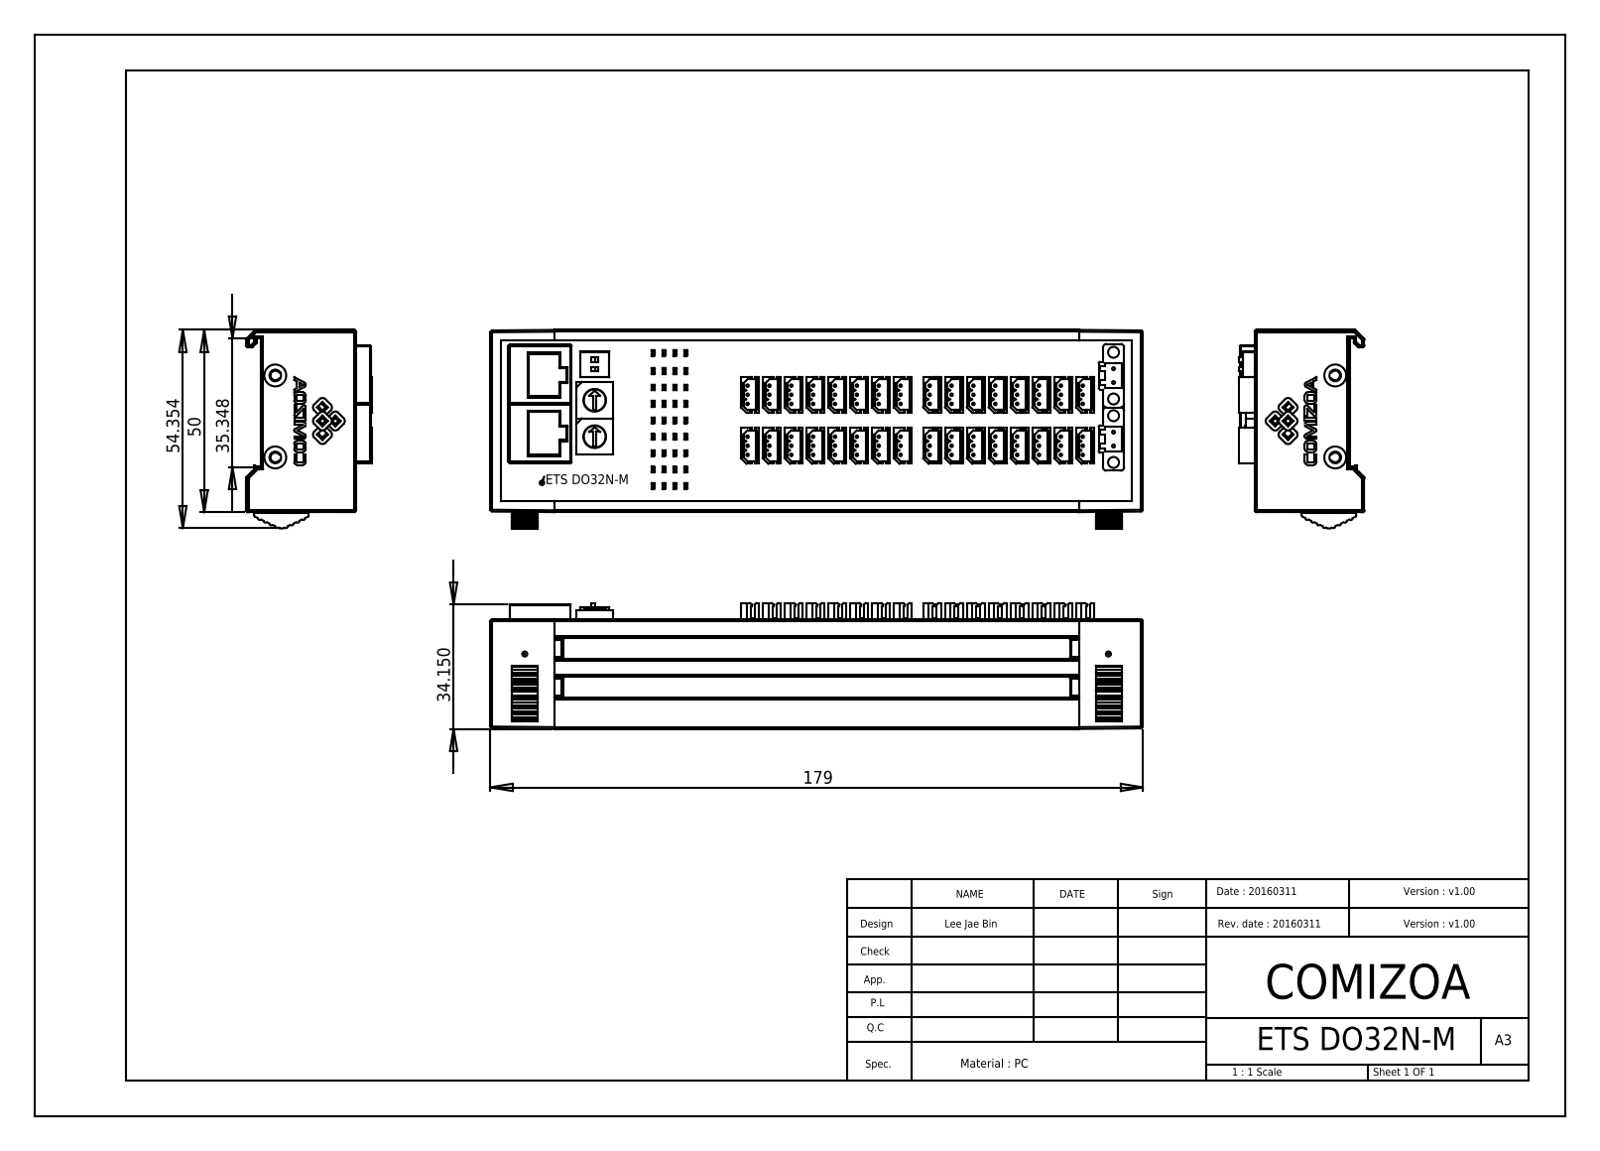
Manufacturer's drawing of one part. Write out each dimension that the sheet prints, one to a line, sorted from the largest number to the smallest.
179
54.354
50
35.348
34.150
